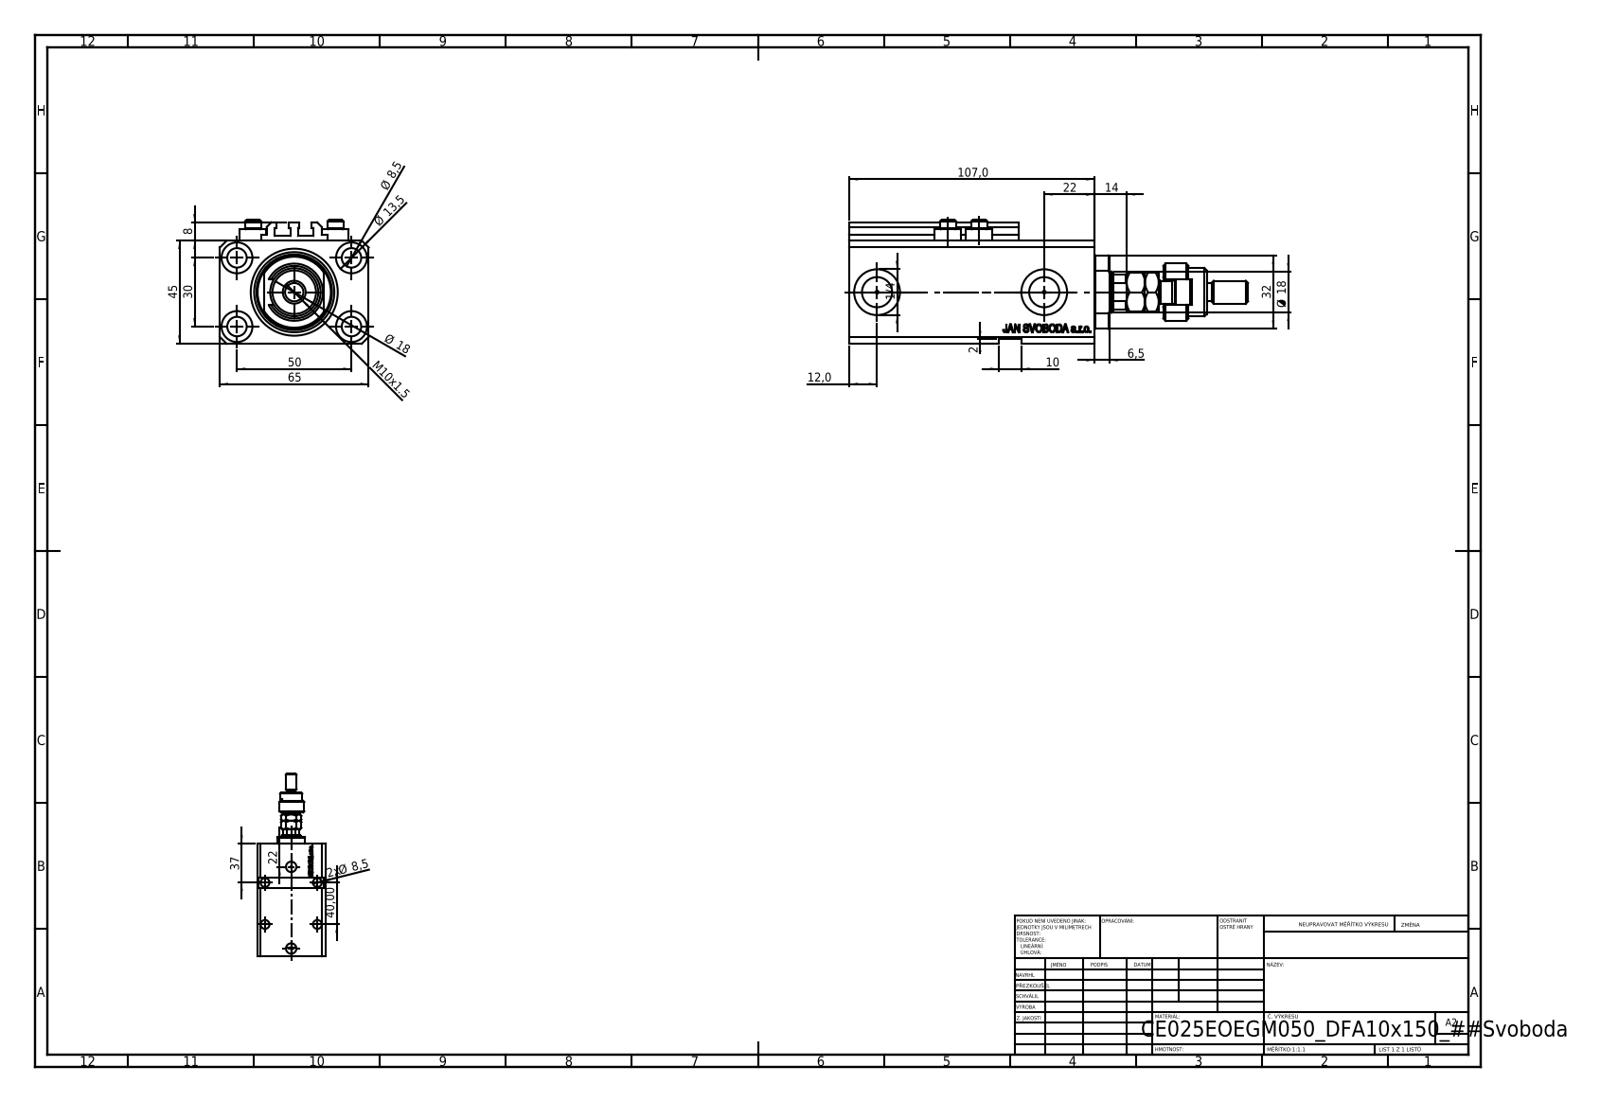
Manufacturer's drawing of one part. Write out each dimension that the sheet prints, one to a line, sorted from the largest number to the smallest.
107,0
65
50
45
40,00
37
32
30
22
22
Ø 18
Ø 18
14
Ø 13,5
12,0
M10x1.5
10
Ø 8,5
2x Ø 8,5
8
6,5
2
1/4
